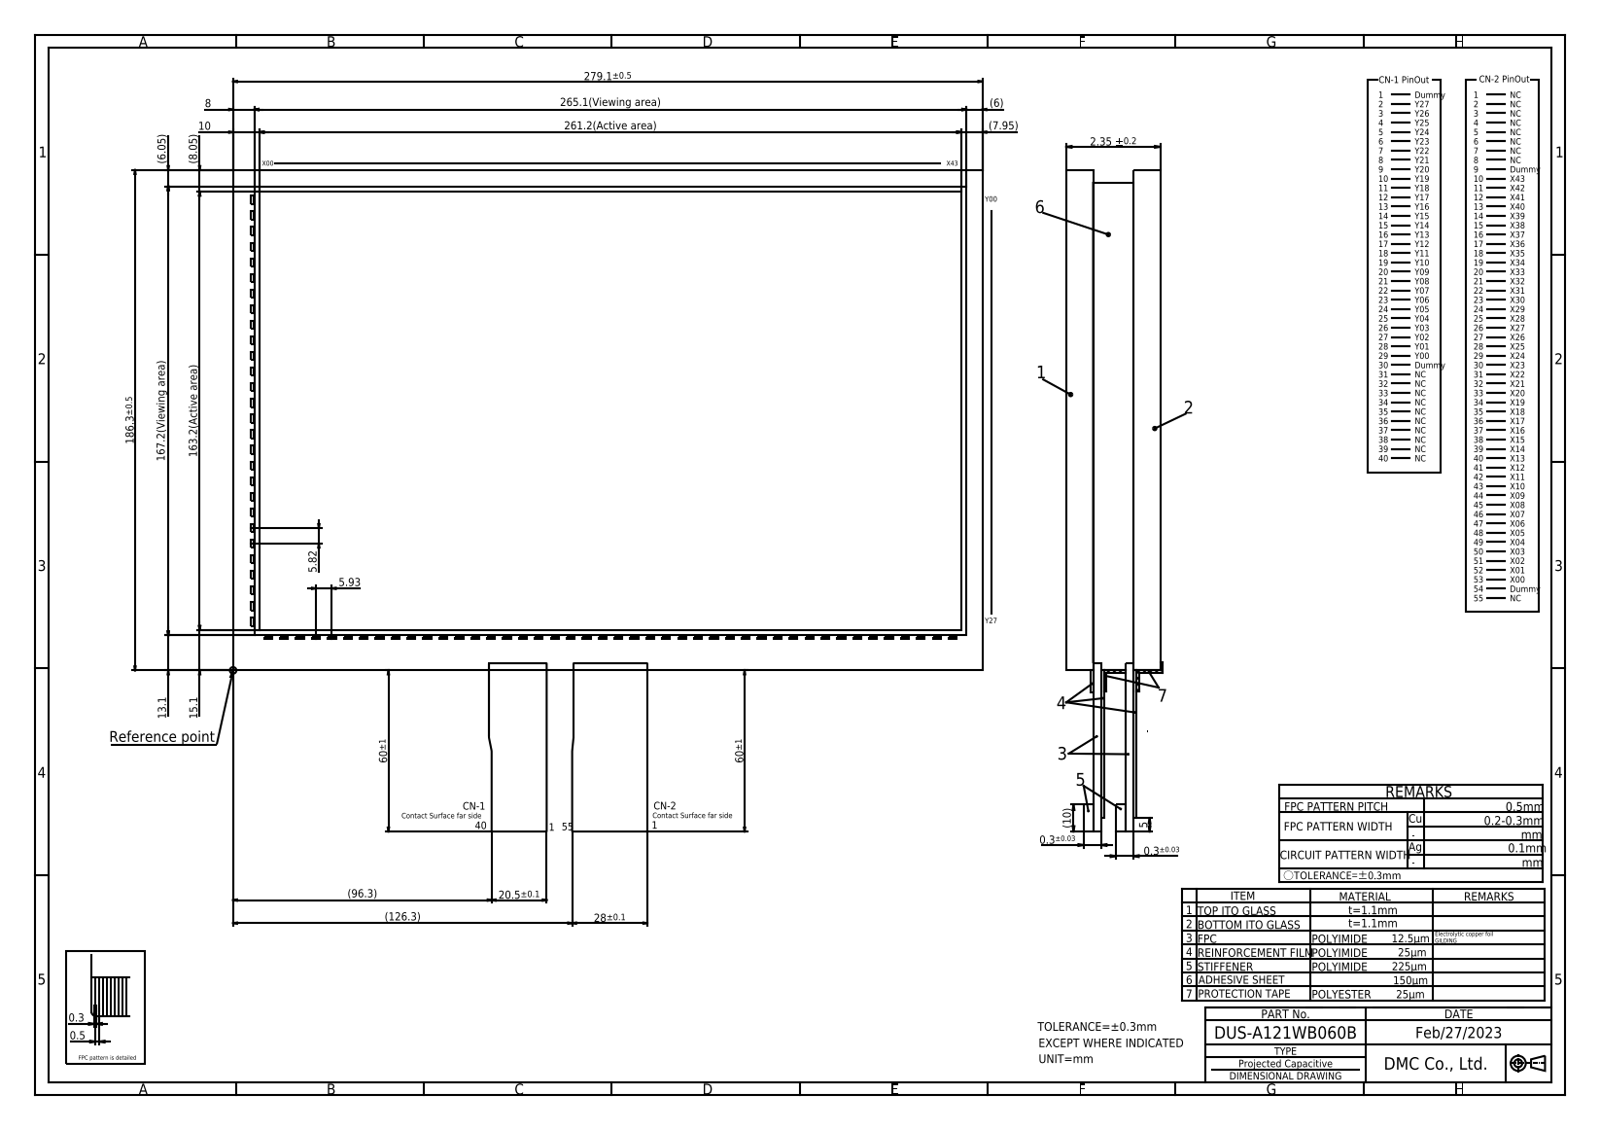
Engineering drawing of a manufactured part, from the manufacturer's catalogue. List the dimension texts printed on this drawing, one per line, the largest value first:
279.1±0.5
265.1(Viewing area)
261.2(Active area)
186.3±0.5
167.2(Viewing area)
163.2(Active area)
(126.3)
(96.3)
60±1
60±1
28±0.1
20.5±0.1
15.1
13.1
(10)
10
(8.05)
8
(7.95)
(6.05)
(6)
5.93
5.82
5
2.35 ±0.2
0.5
0.3
0.3±0.03
0.3±0.03
